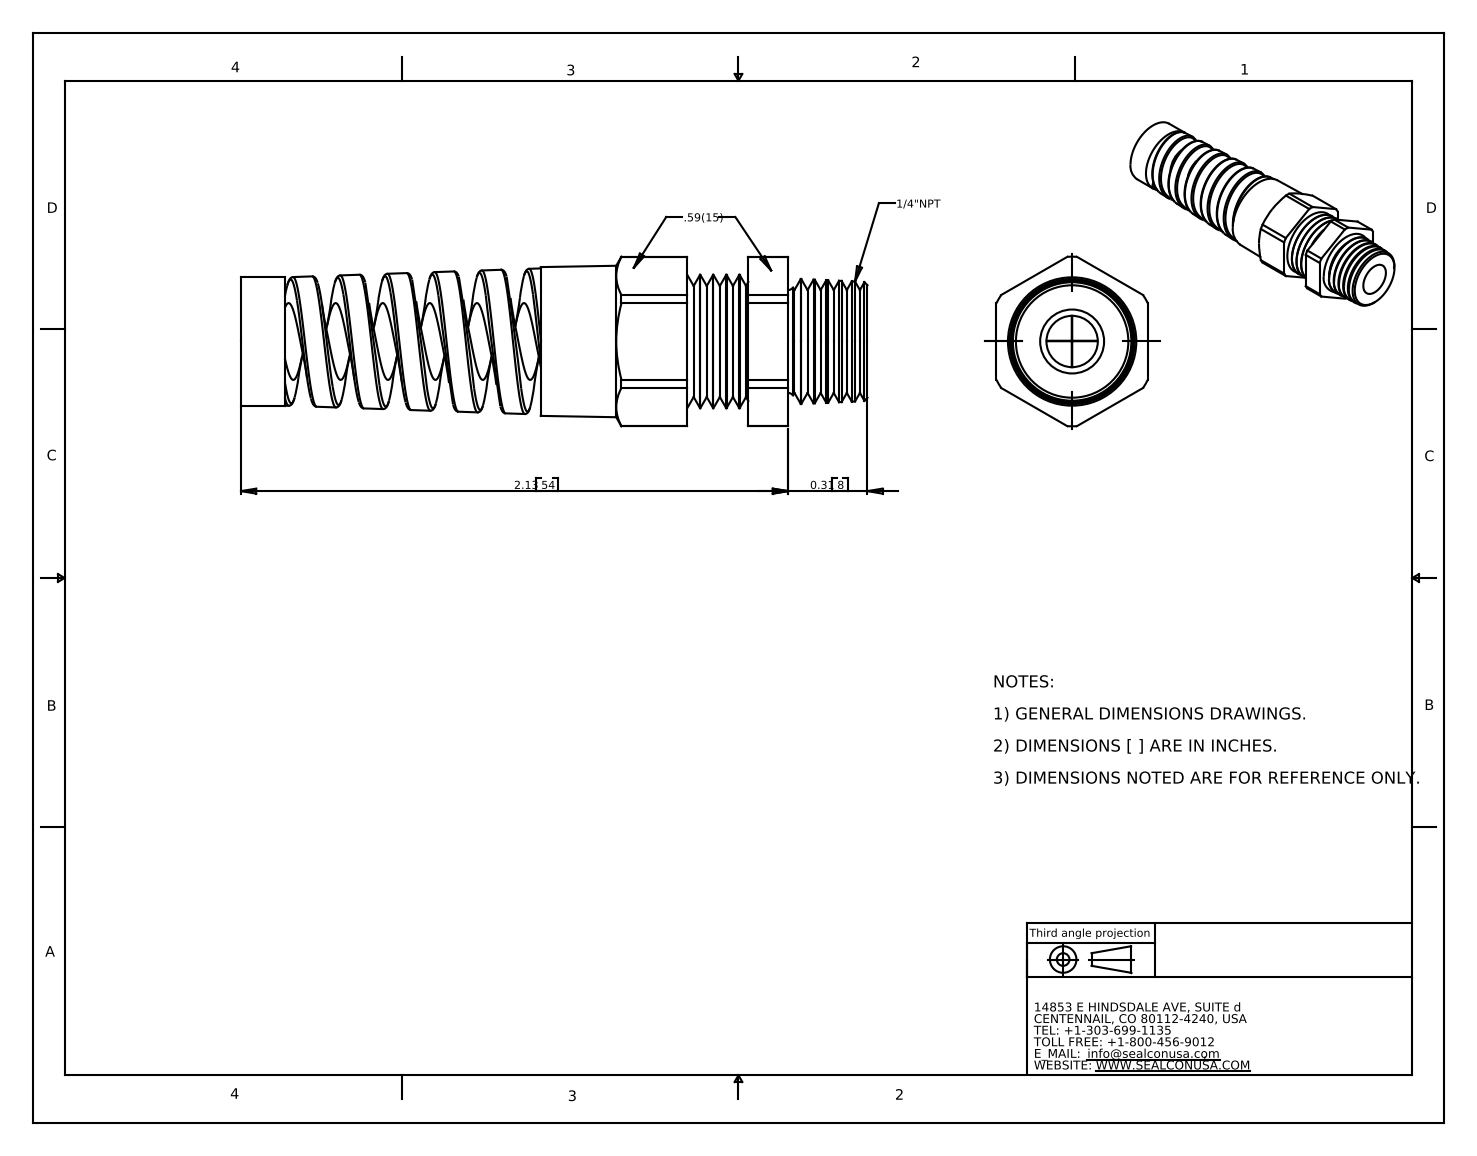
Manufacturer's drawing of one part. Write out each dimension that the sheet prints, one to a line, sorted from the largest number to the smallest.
2.13 54
0.31 8
